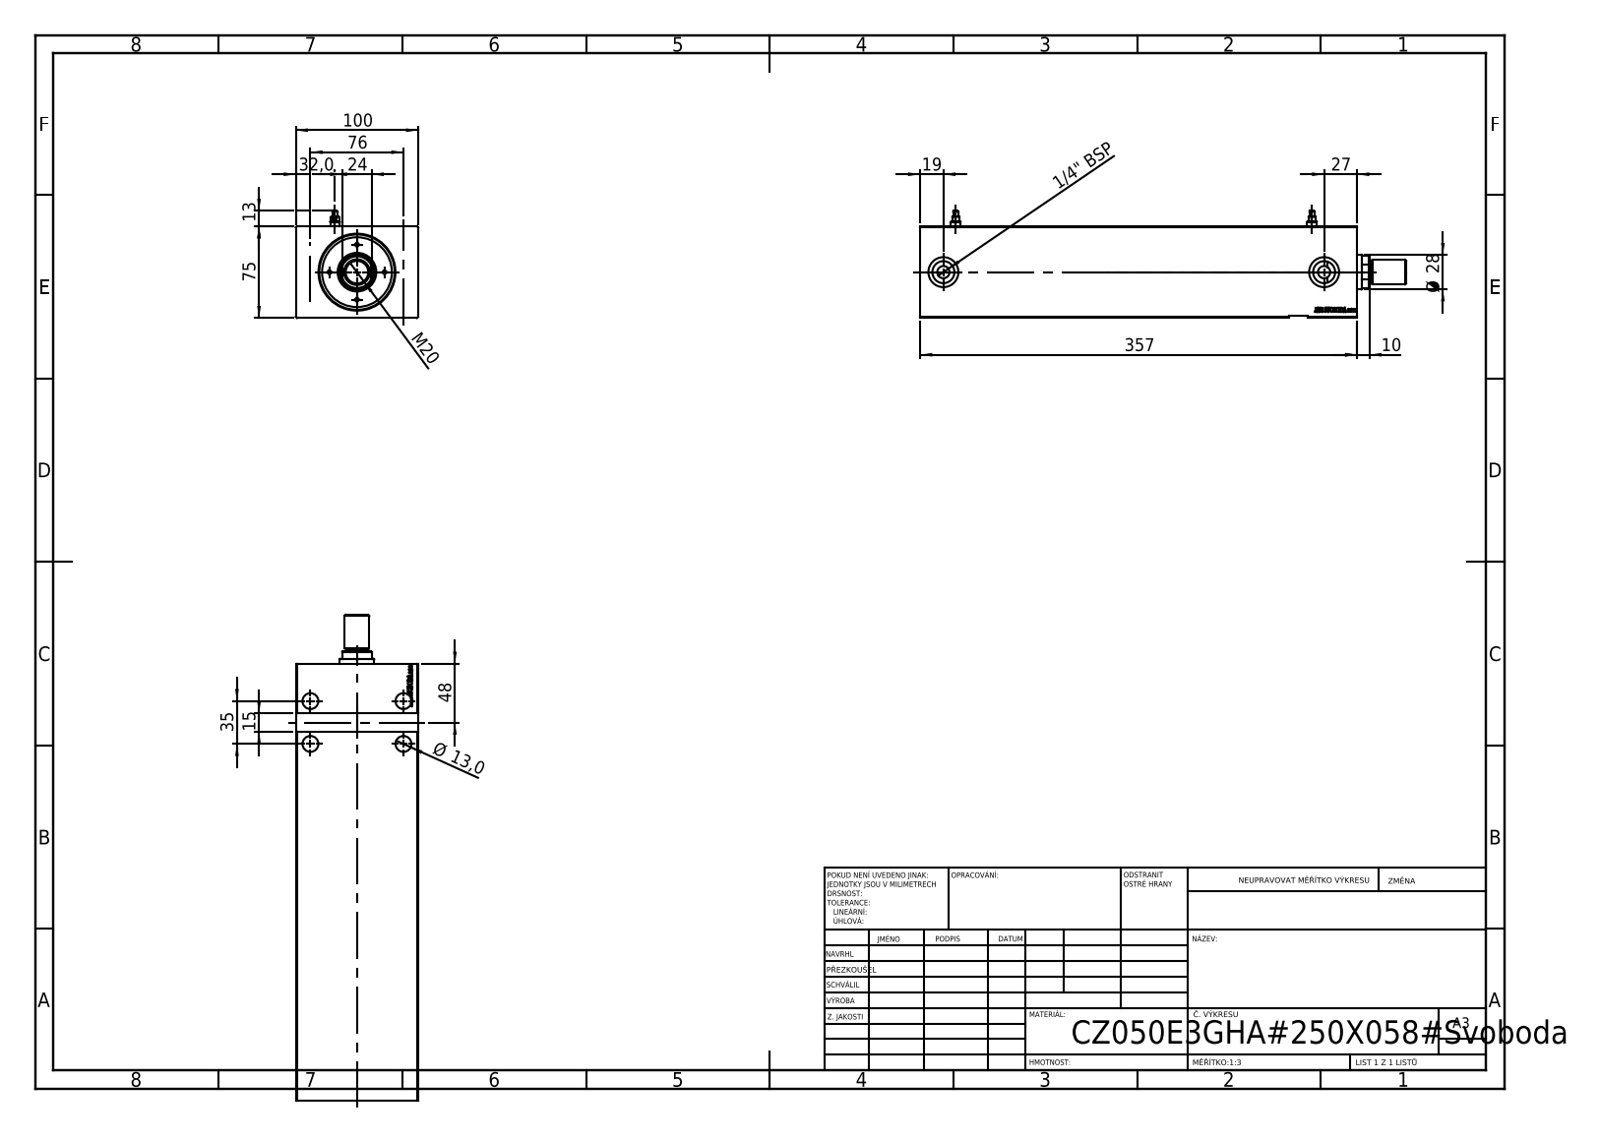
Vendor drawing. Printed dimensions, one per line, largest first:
357
100
76
75
48
35
32,0
Ø 28
27
24
M20
19
15
13
Ø 13,0
10
1/4" BSP
